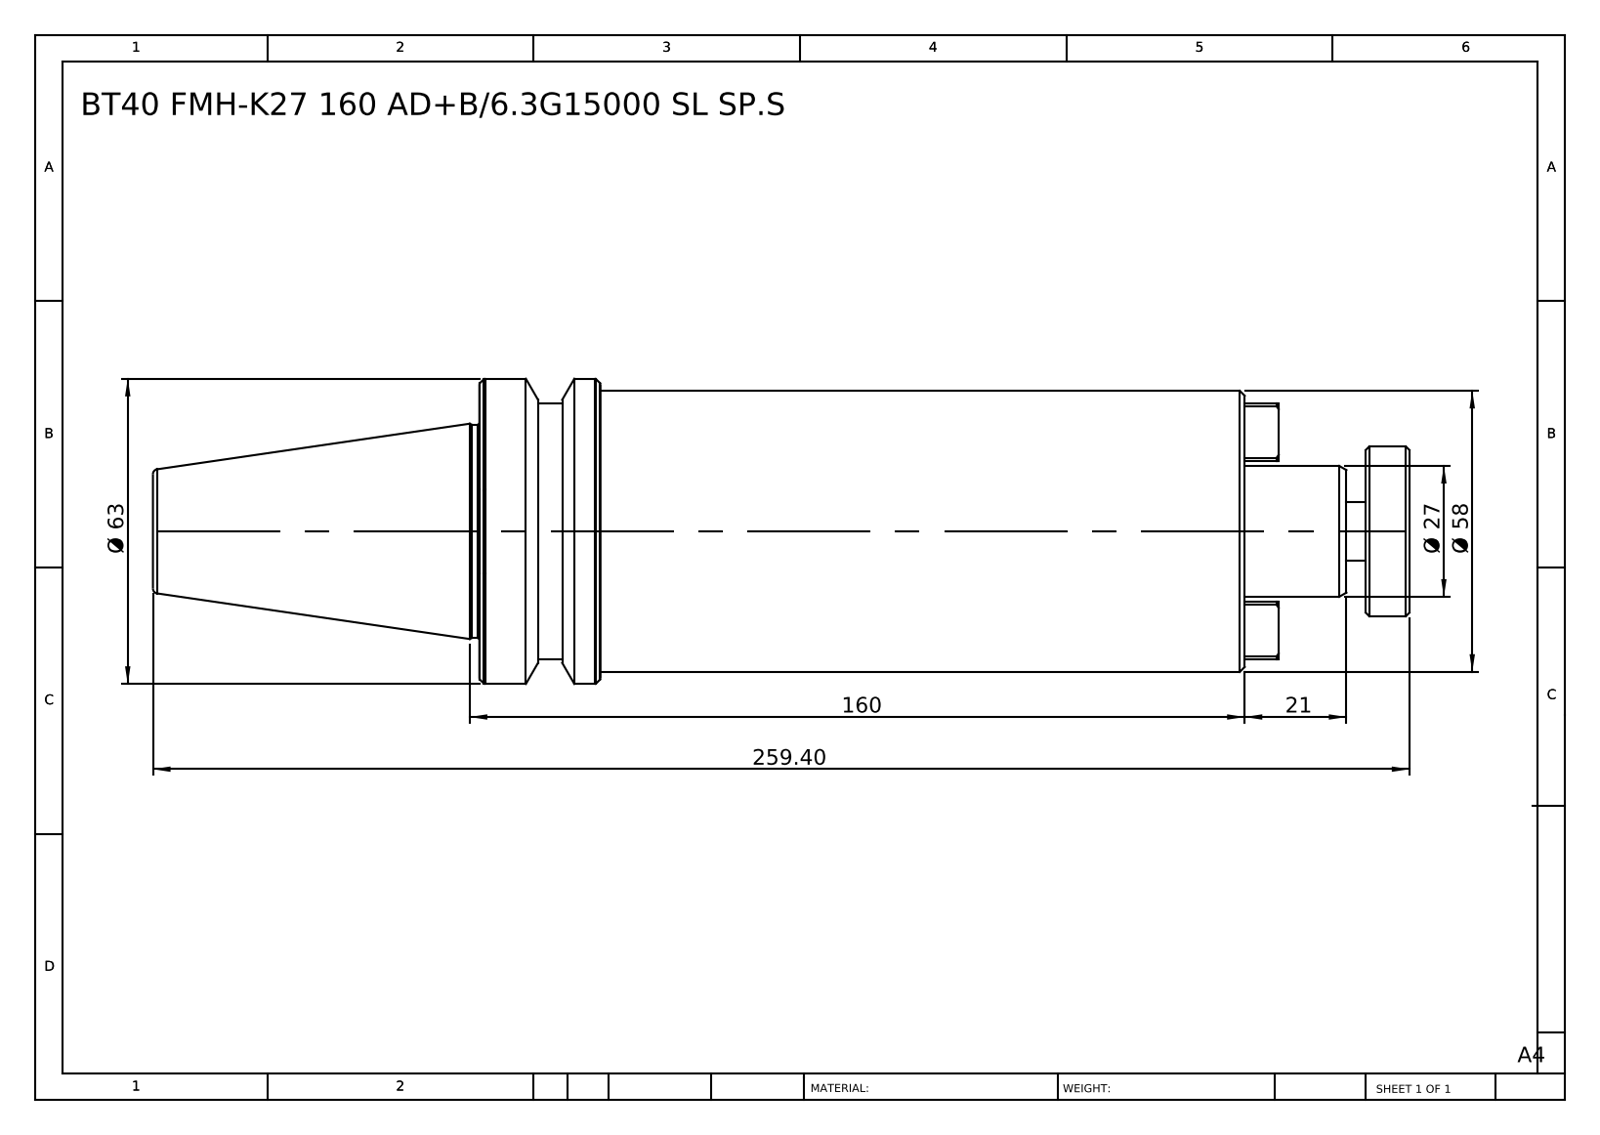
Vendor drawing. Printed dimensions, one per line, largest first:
259.40
160
Ø 63
Ø 58
Ø 27
21
